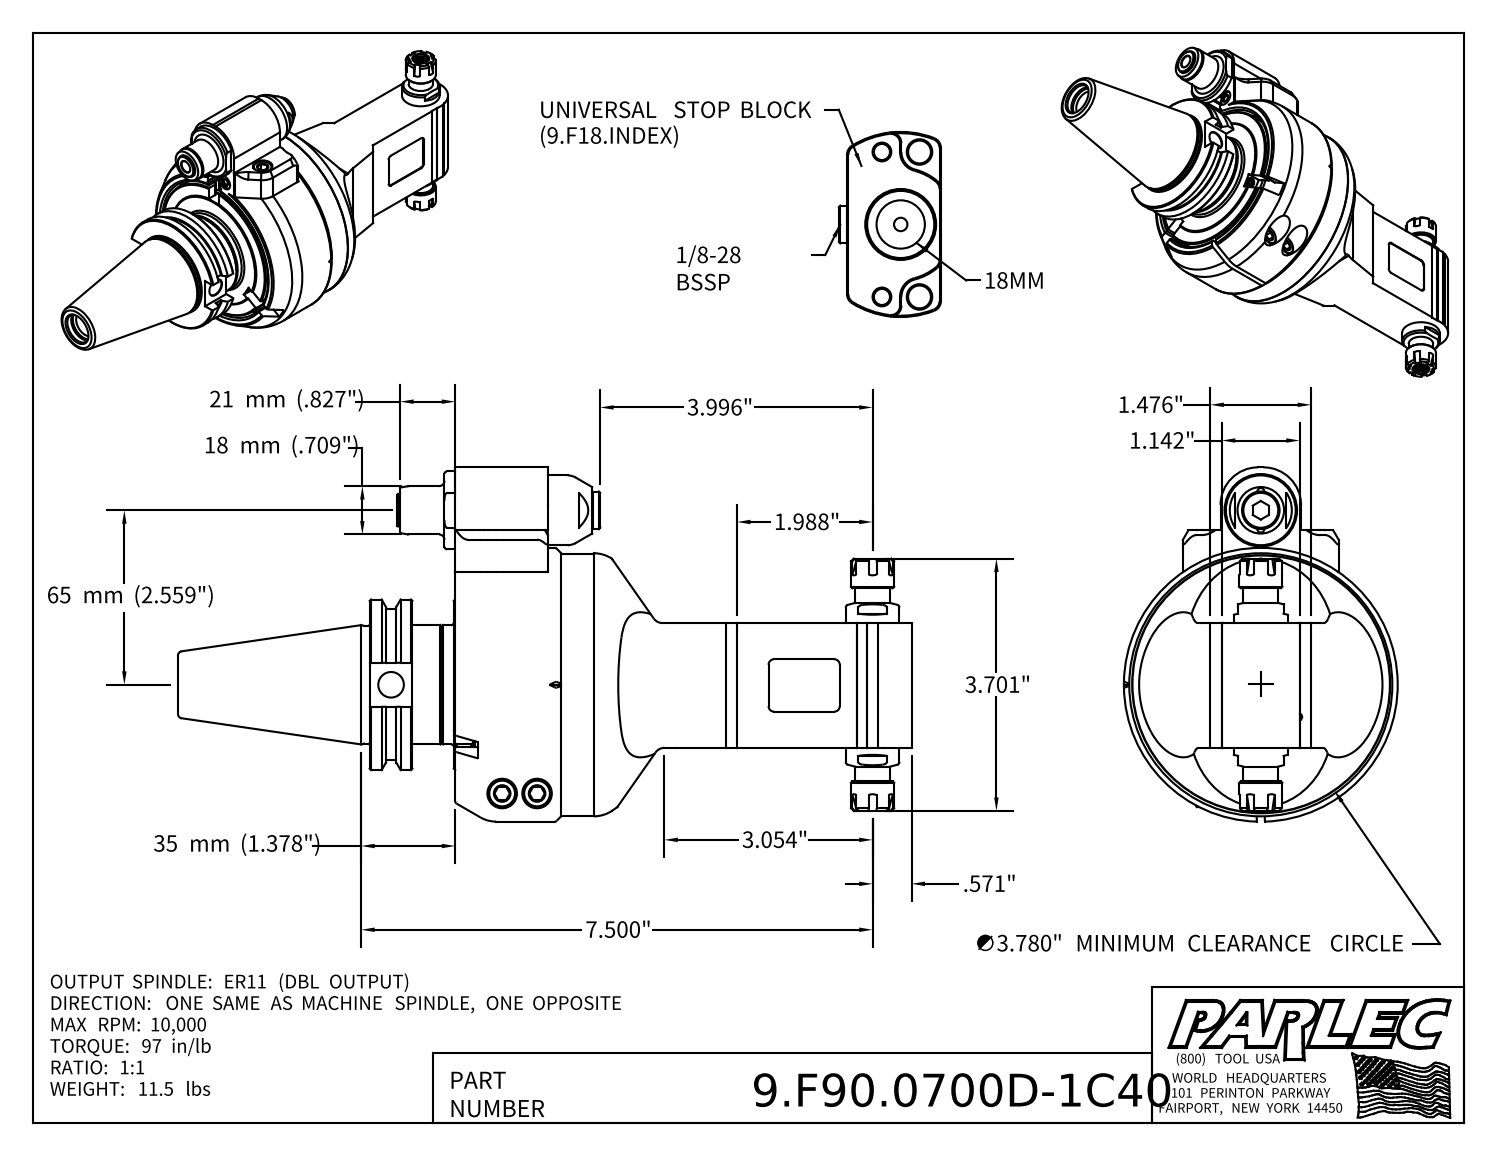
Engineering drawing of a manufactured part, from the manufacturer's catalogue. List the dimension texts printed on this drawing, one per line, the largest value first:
65 mm (2.559")
35 mm (1.378")
21 mm (.827")
18 mm (.709")
7.500"
3.996"
∅3.780" MINIMUM CLEARANCE CIRCLE
3.701"
3.054"
1.988"
1.476"
1.142"
.571"
